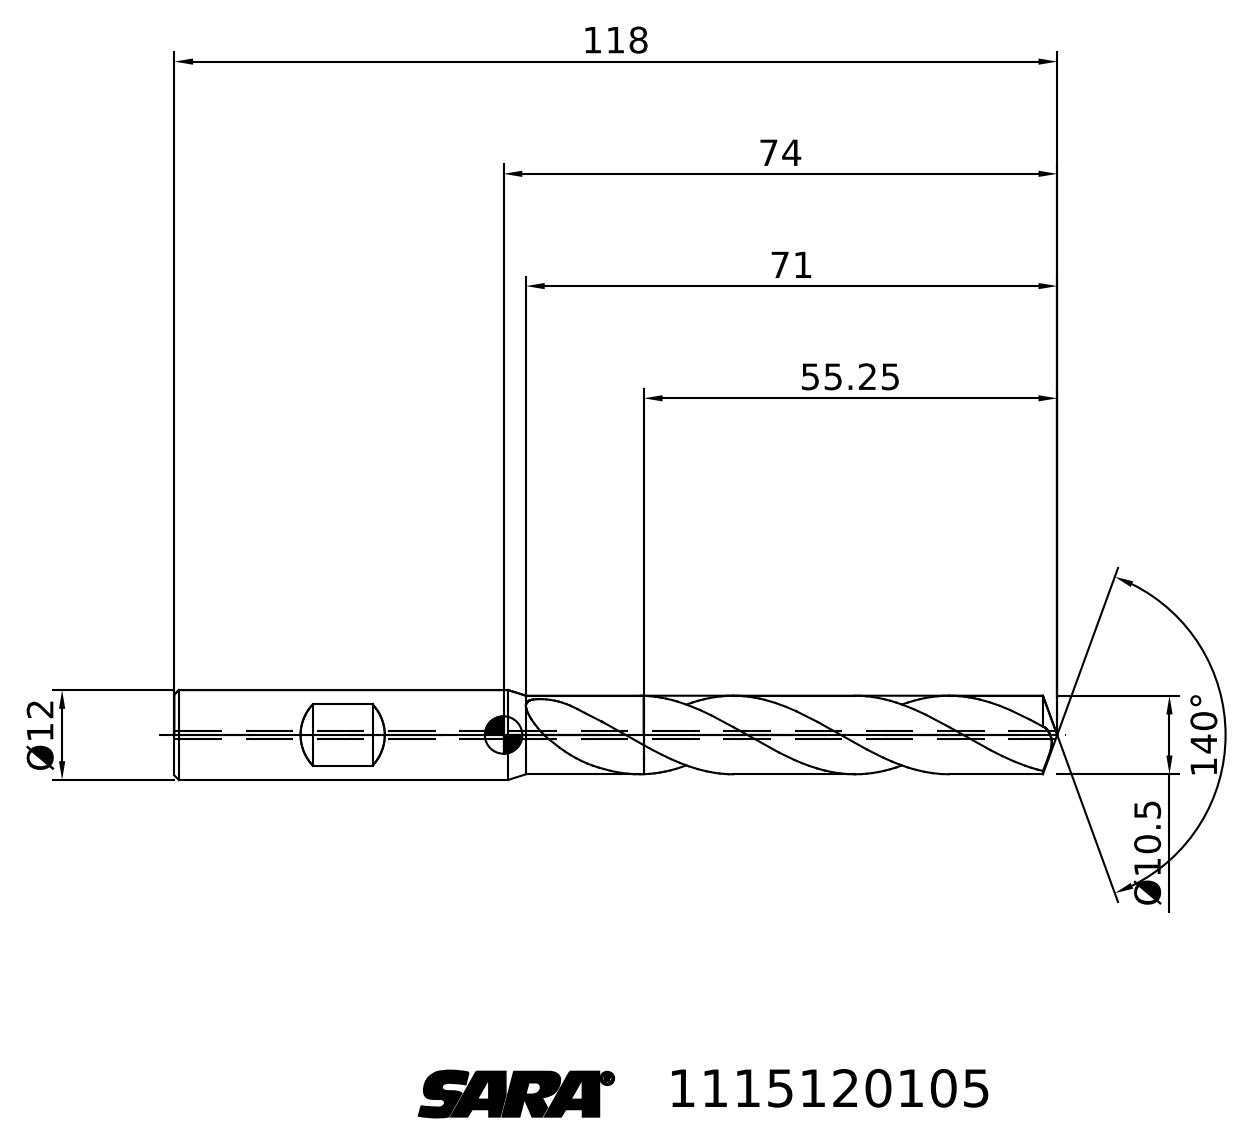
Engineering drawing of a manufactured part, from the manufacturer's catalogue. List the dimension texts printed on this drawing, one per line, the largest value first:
140°
118
74
71
55.25
Ø12
Ø10.5
